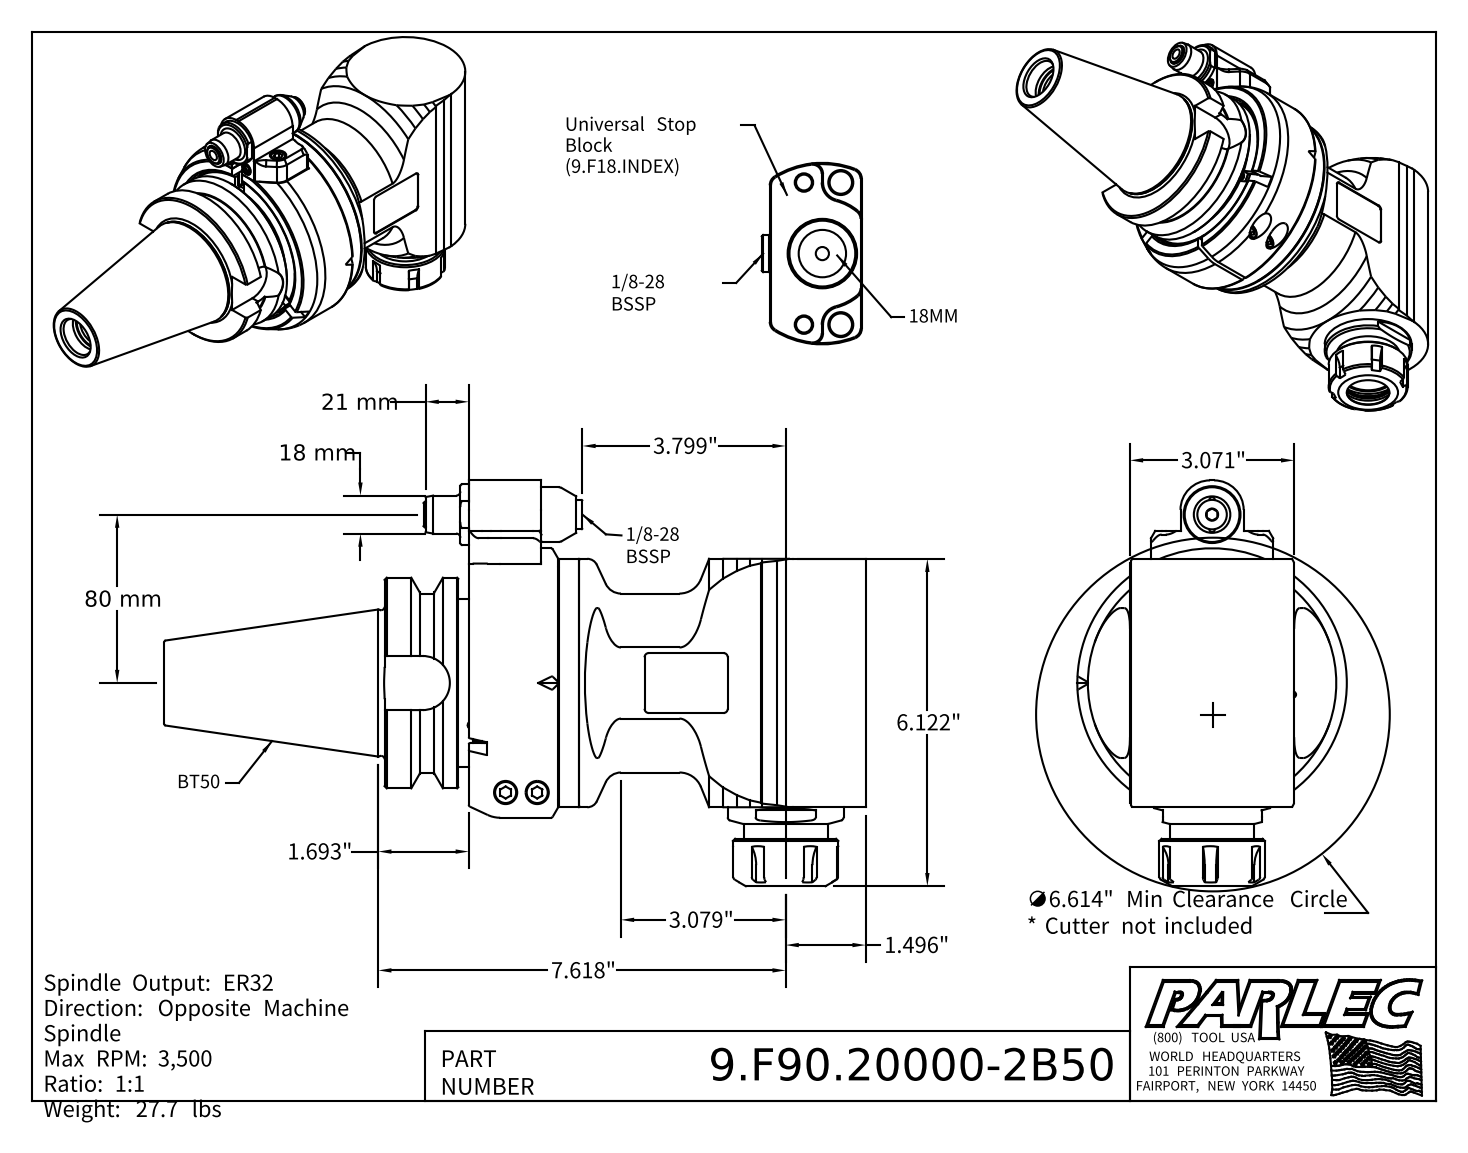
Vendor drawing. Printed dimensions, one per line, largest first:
80 mm
21 mm
18 mm
7.618"
∅6.614" Min Clearance Circle * Cutter not included
6.122"
3.799"
3.079"
3.071"
1.693"
1.496"
